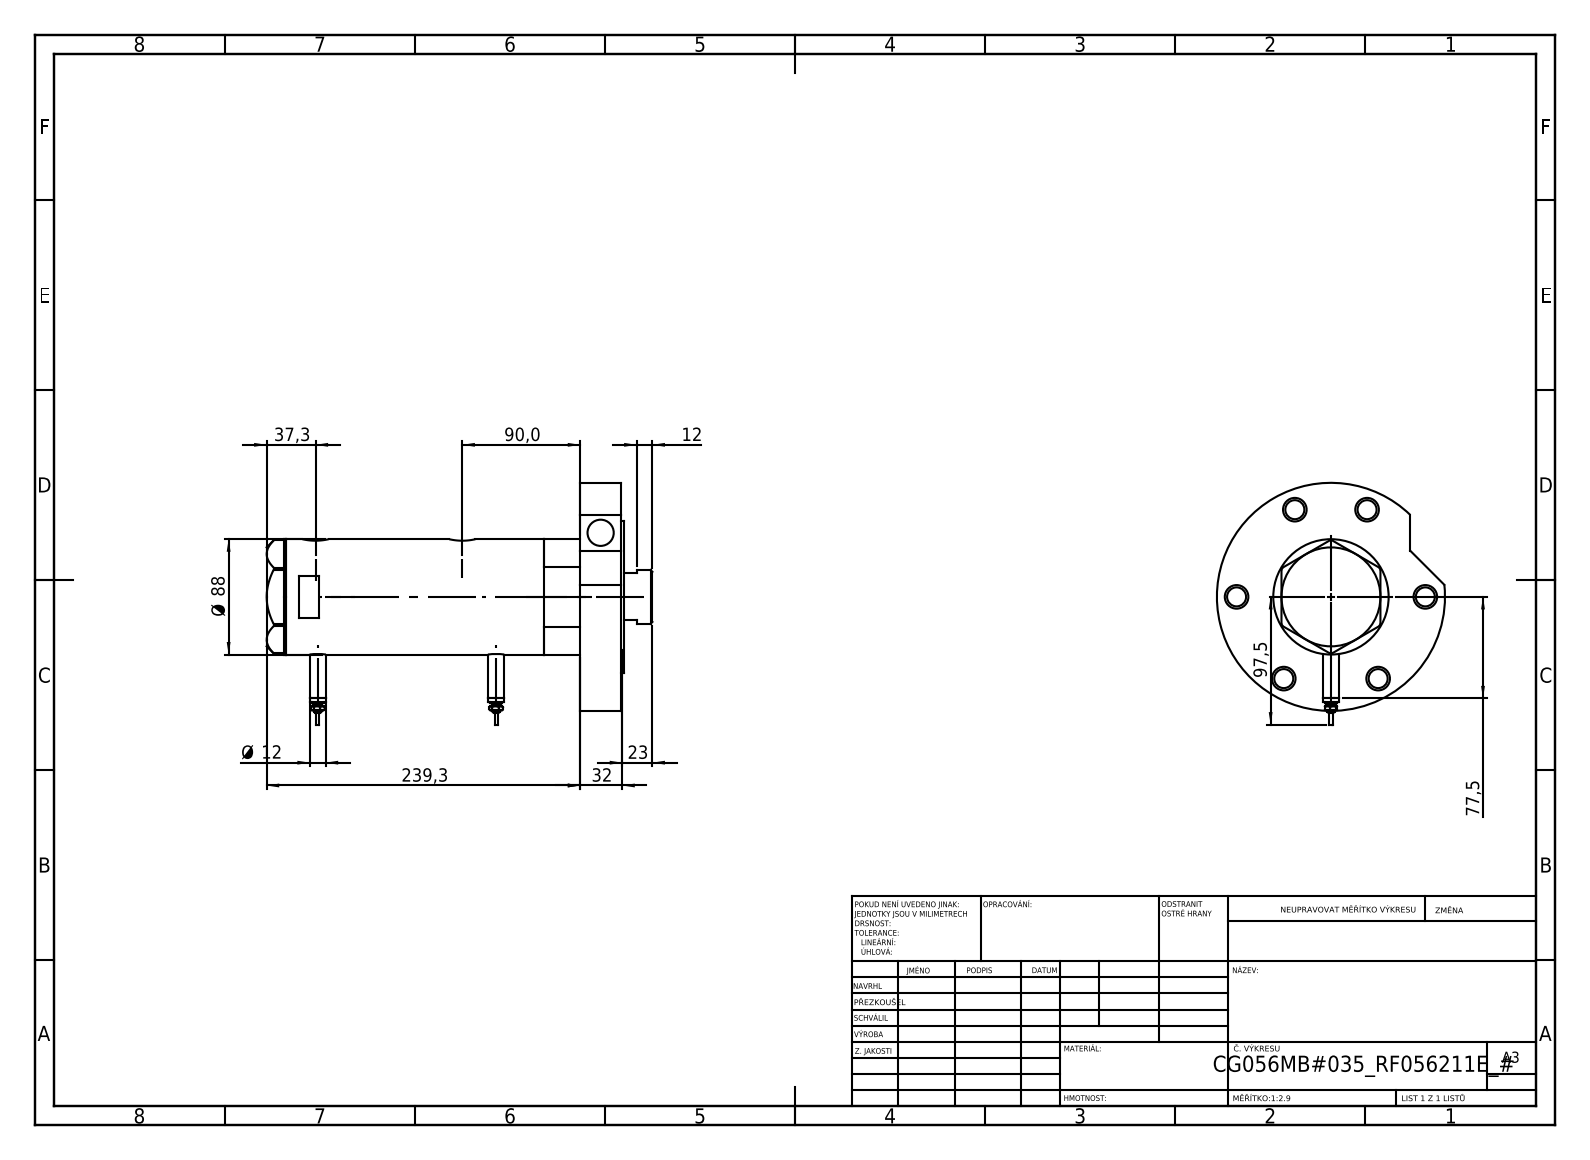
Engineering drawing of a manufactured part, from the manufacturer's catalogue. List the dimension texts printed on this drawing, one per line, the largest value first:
239,3
97,5
90,0
Ø 88
77,5
37,3
32
23
12
Ø 12
